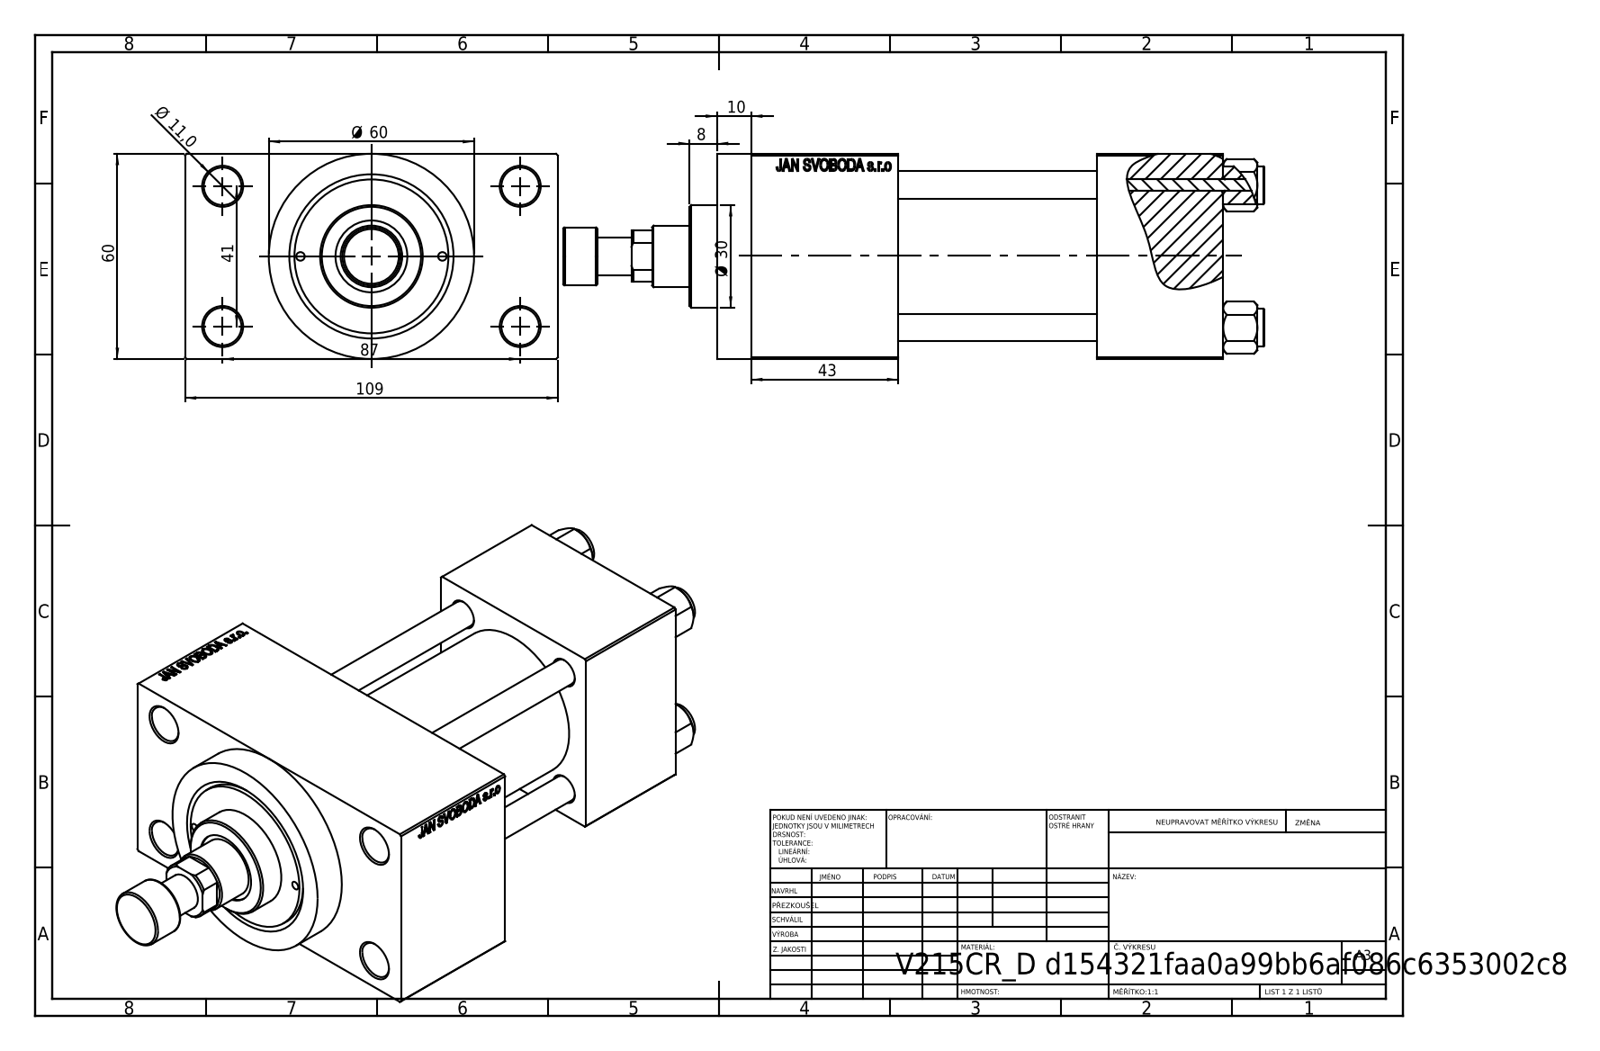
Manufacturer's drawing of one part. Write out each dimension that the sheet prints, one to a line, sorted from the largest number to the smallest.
109
87
60
Ø 60
43
41
Ø 30
Ø 11,0
10
8
